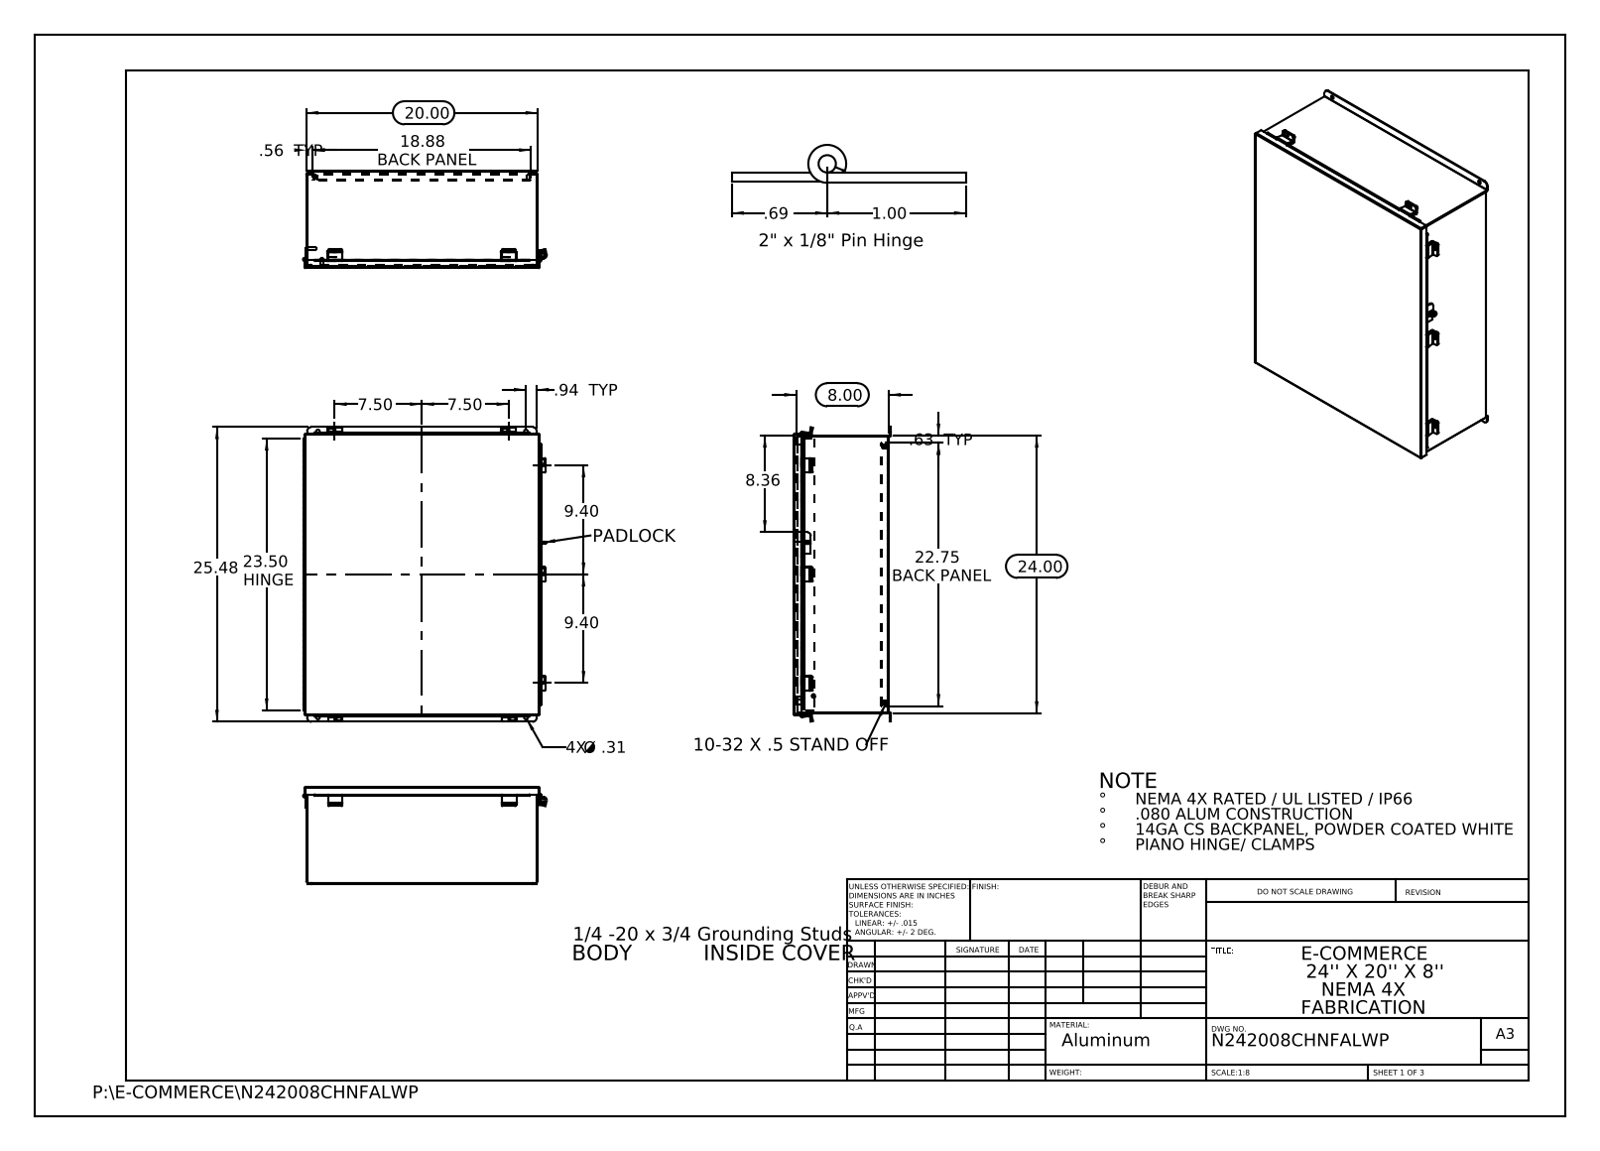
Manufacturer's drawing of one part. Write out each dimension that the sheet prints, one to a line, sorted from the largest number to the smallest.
25.48
24.00
23.50 HINGE
22.75 BACK PANEL
20.00
18.88 BACK PANEL
9.40
9.40
8.36
8.00
7.50
7.50
1.00
.94 TYP
.69
.63 TYP
.56 TYP
4X Ø .31
